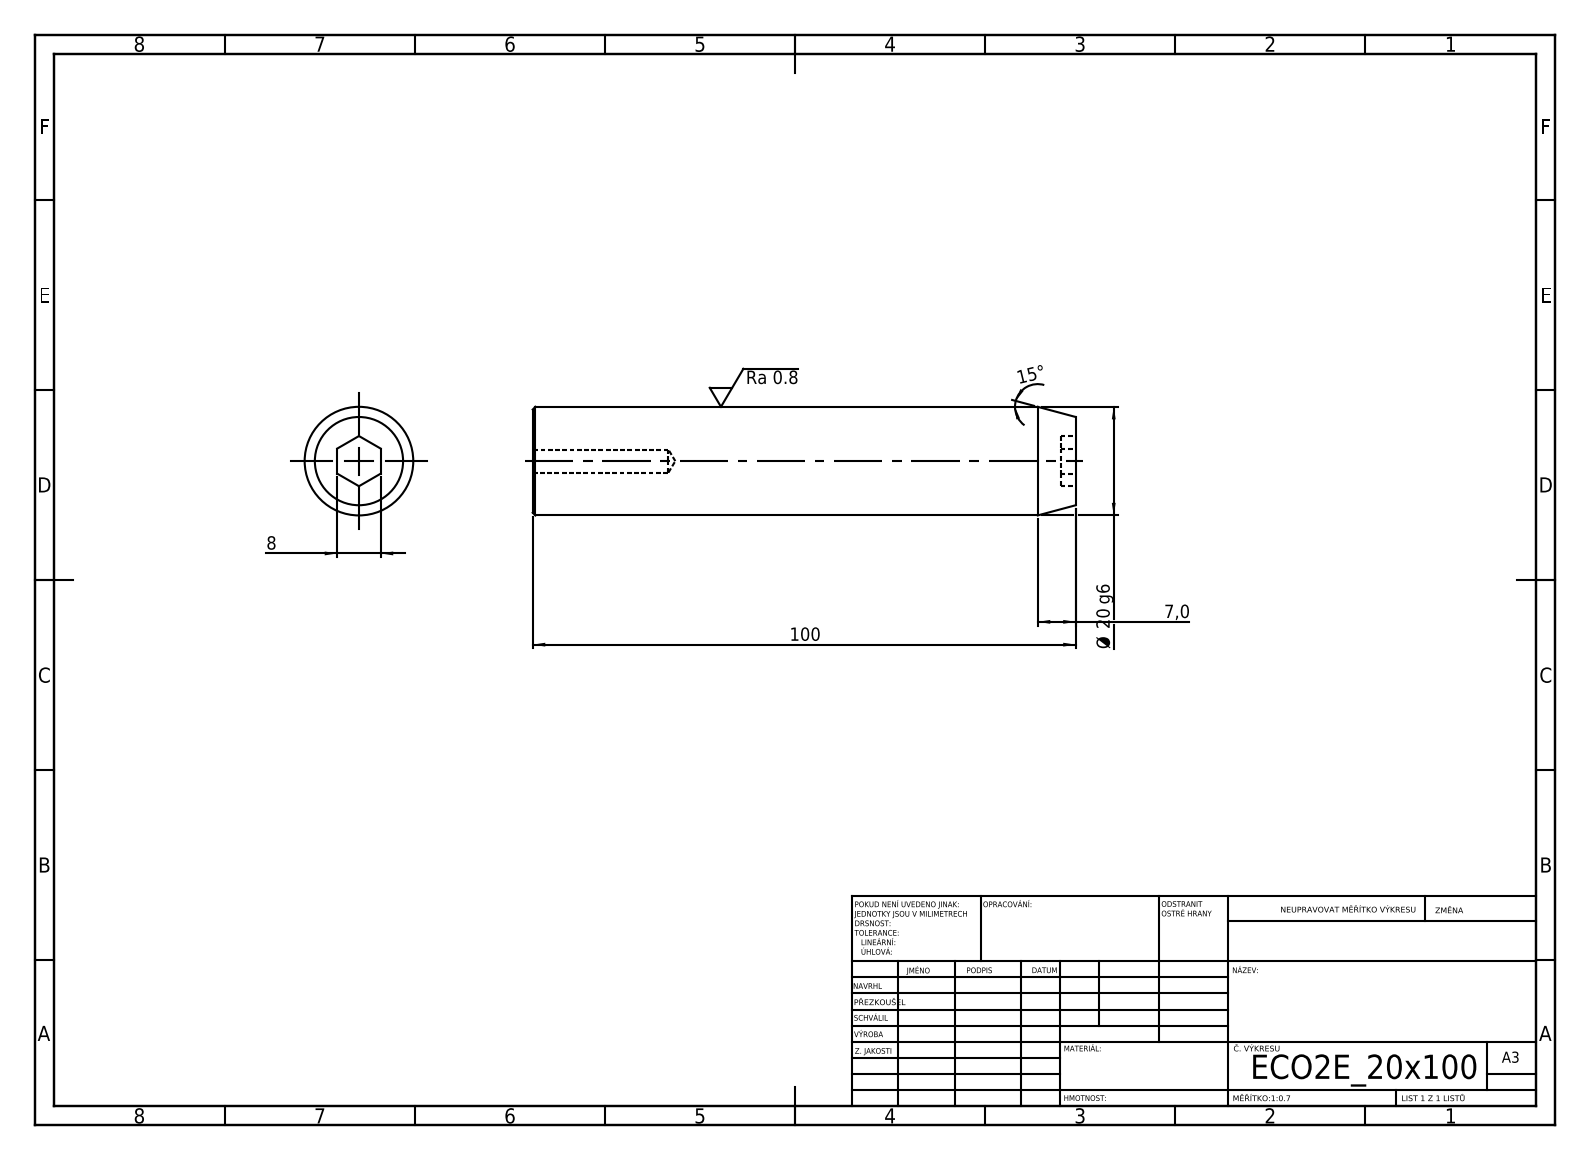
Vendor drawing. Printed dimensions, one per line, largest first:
100
Ø 20 g6
15°
8
7,0
